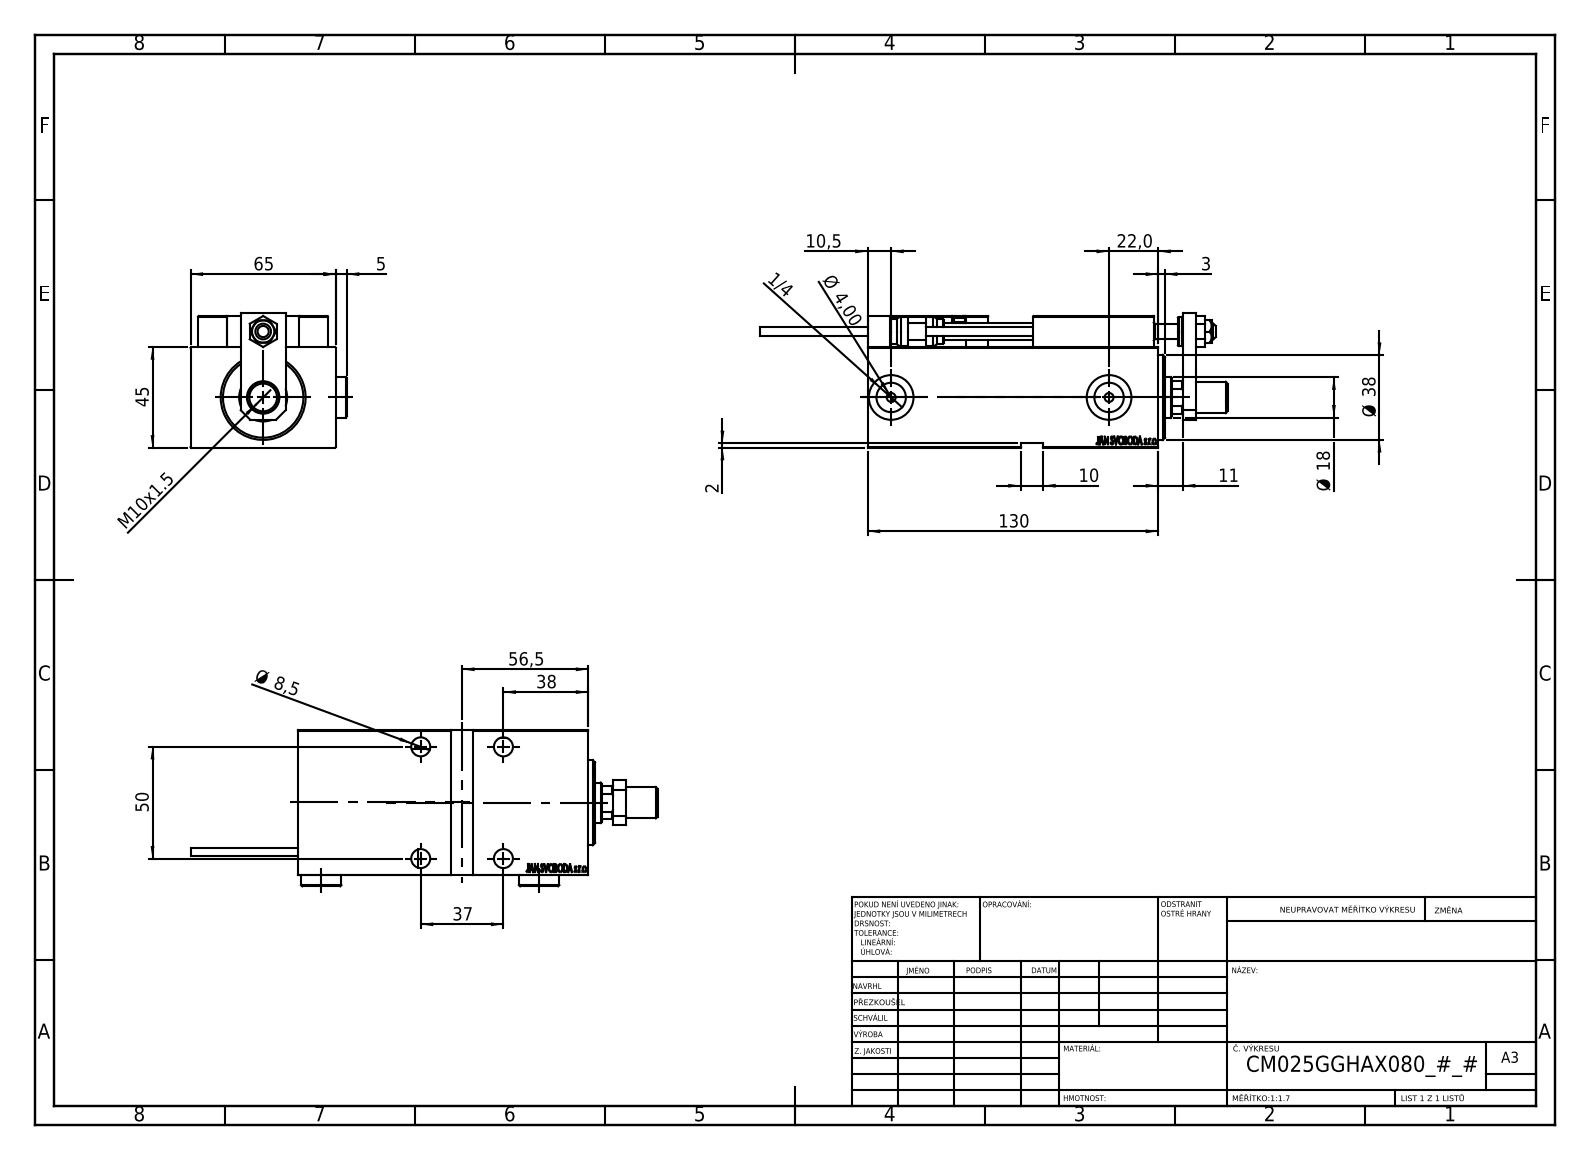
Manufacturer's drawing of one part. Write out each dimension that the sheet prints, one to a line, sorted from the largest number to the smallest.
130
65
56,5
50
45
Ø 38
38
37
22,0
Ø 18
11
10,5
M10x1.5
10
Ø 8,5
5
Ø 4,00
3
2
1/4
